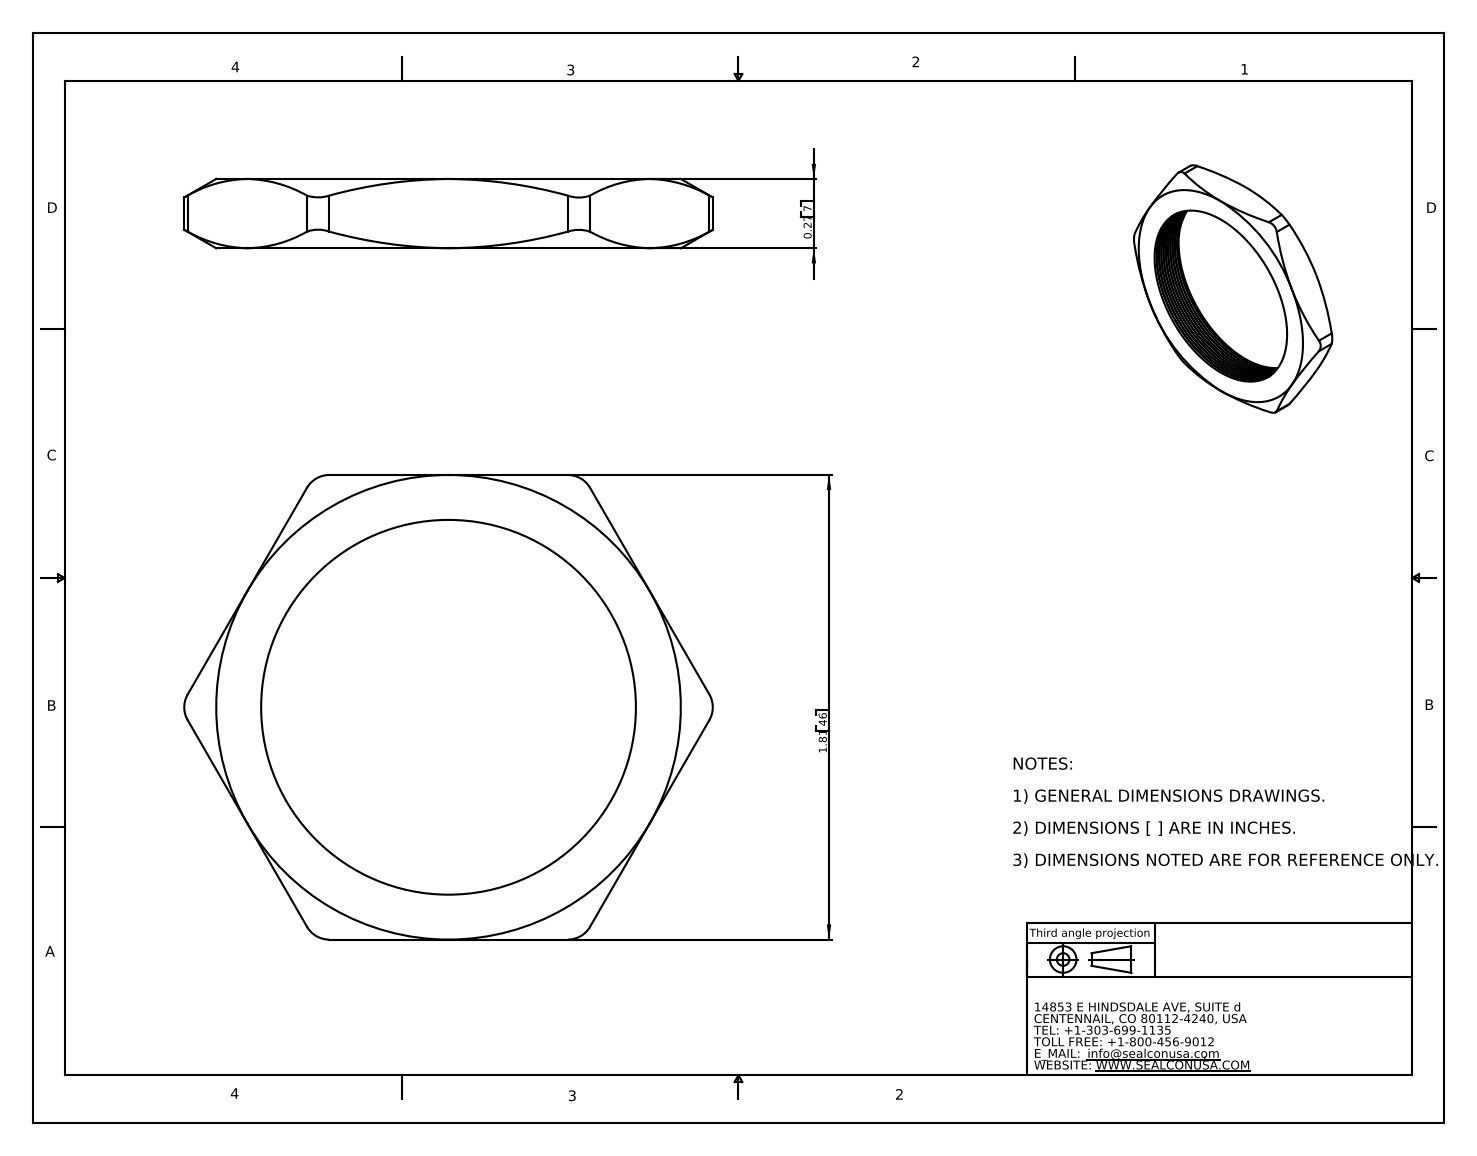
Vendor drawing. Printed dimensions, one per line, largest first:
1.81 46
0.27 7
